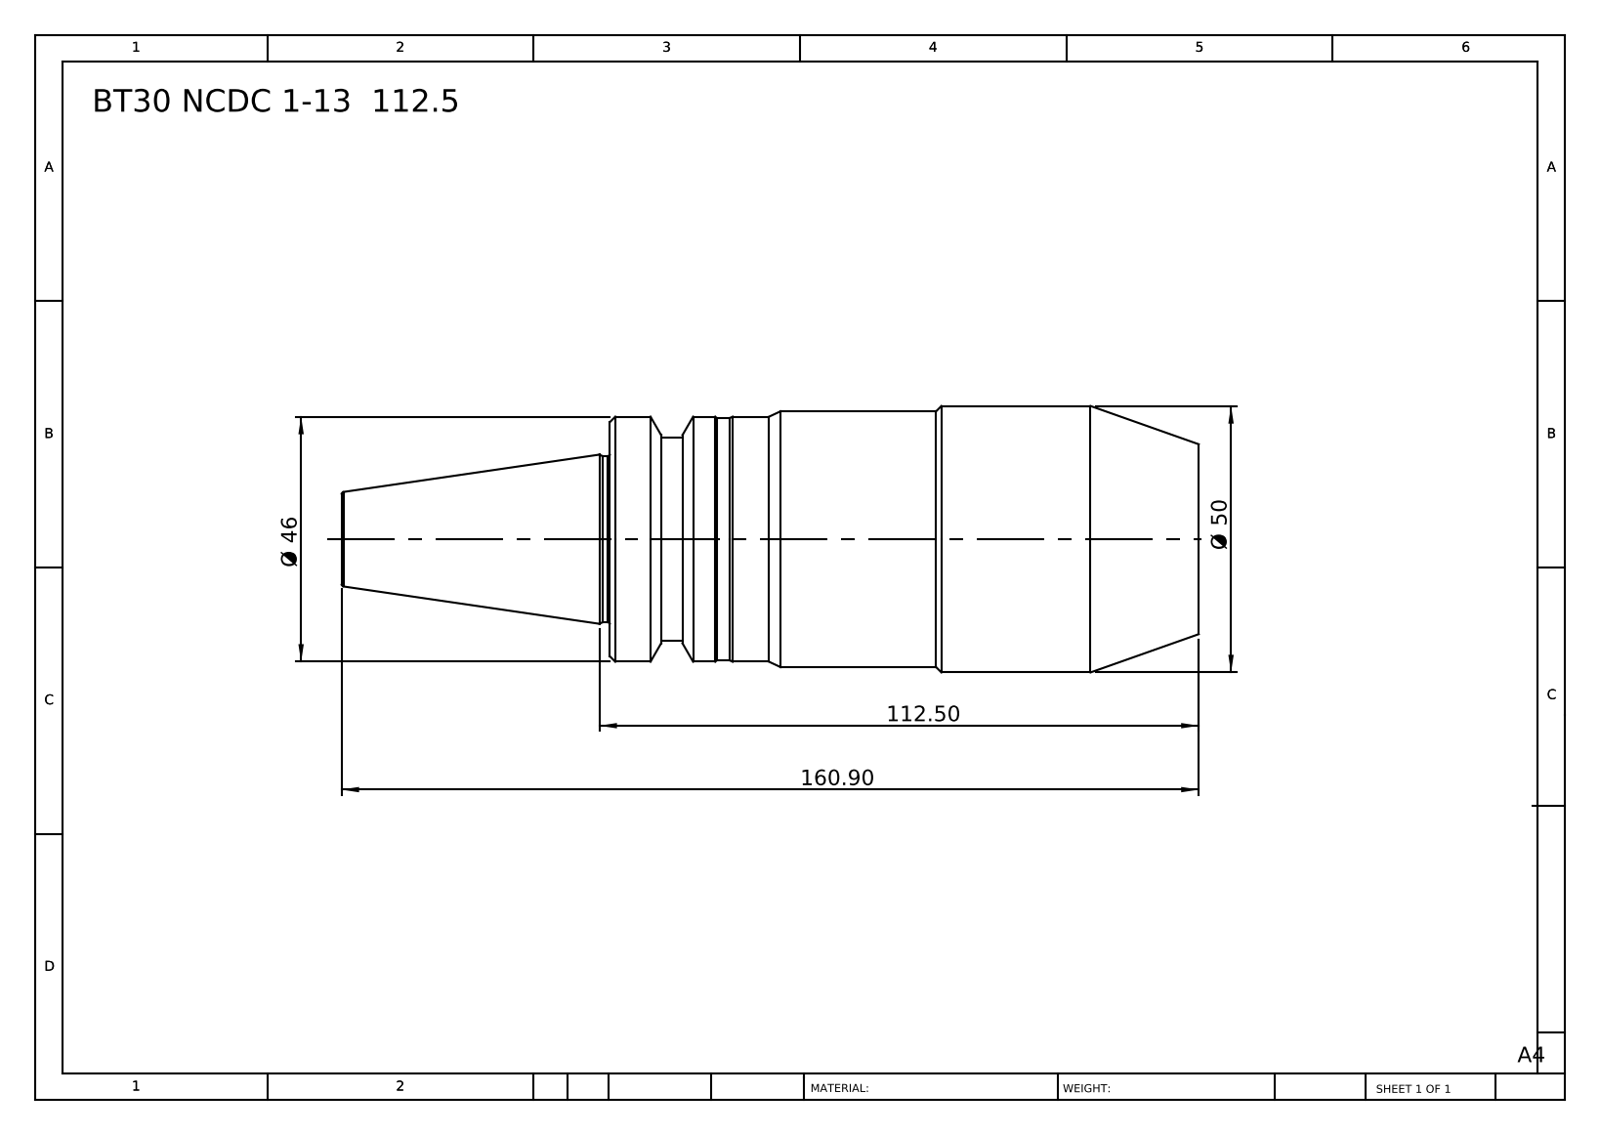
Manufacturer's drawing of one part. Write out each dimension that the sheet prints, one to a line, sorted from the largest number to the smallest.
160.90
112.50
Ø 50
Ø 46
